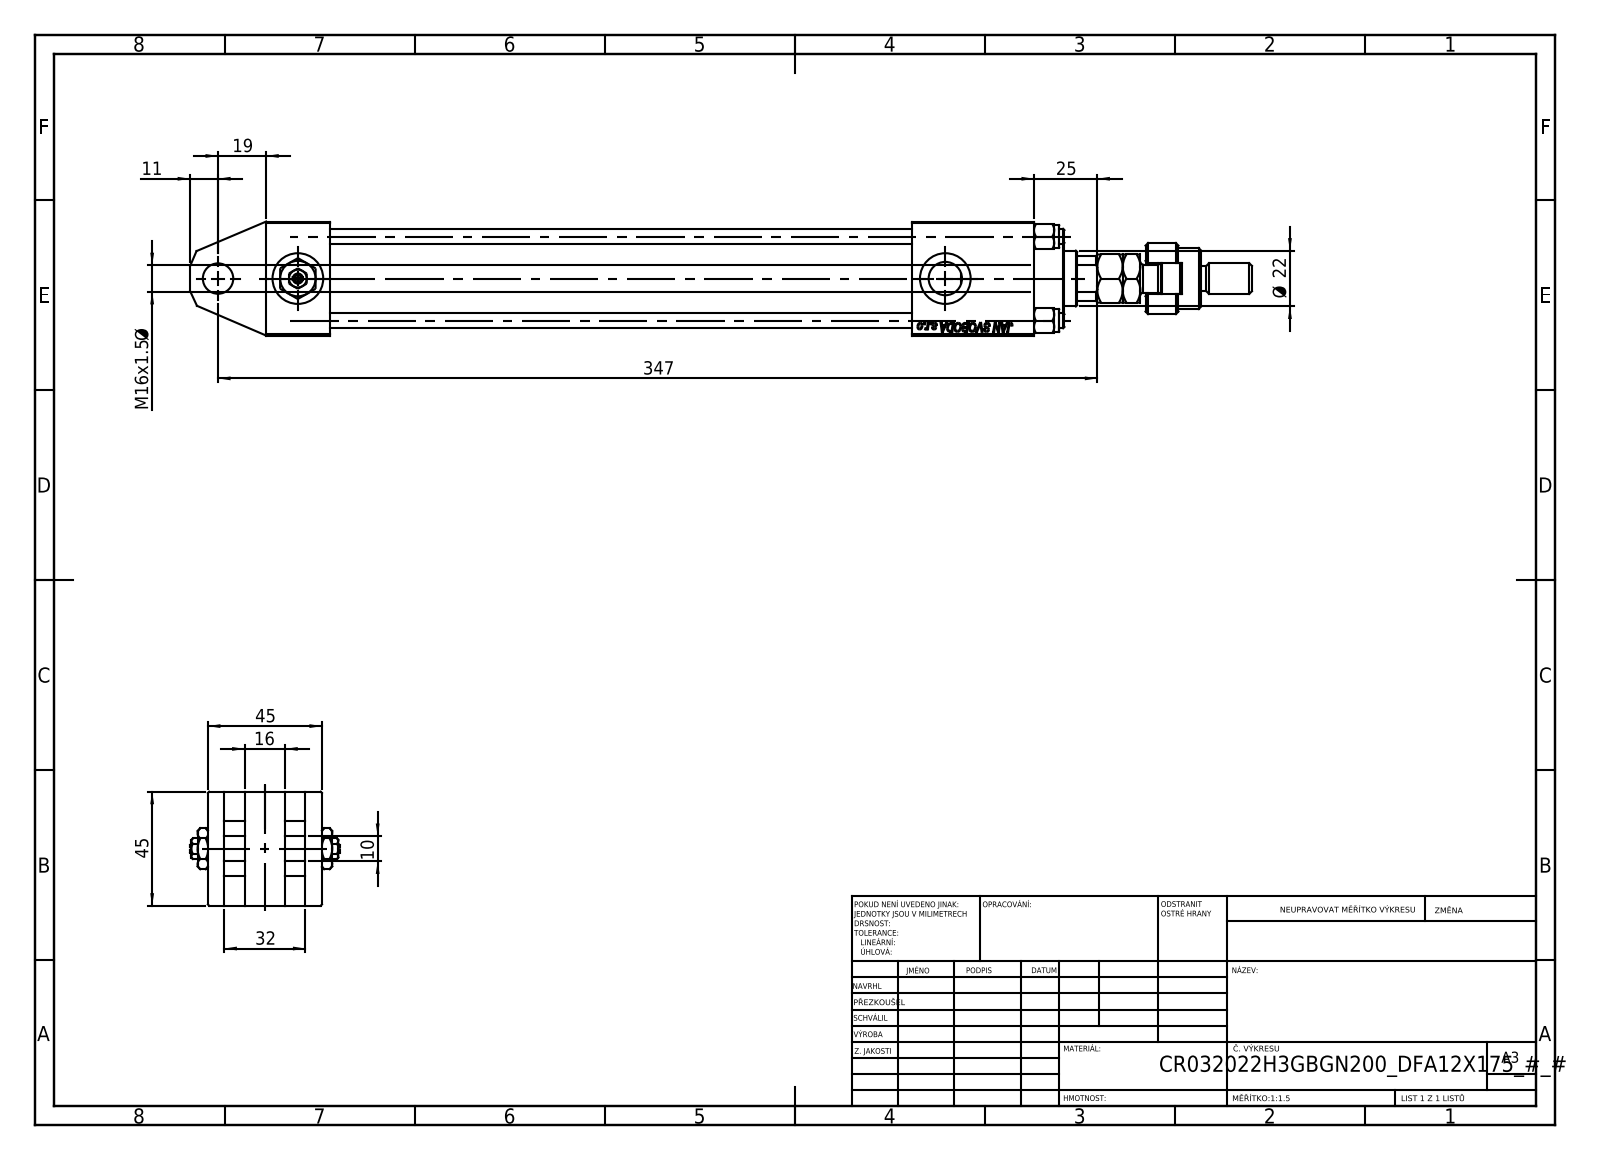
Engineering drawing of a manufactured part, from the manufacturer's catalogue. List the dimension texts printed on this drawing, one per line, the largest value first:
347
45
45
32
25
Ø 22
19
M16x1.5 Ø
16
11
10
